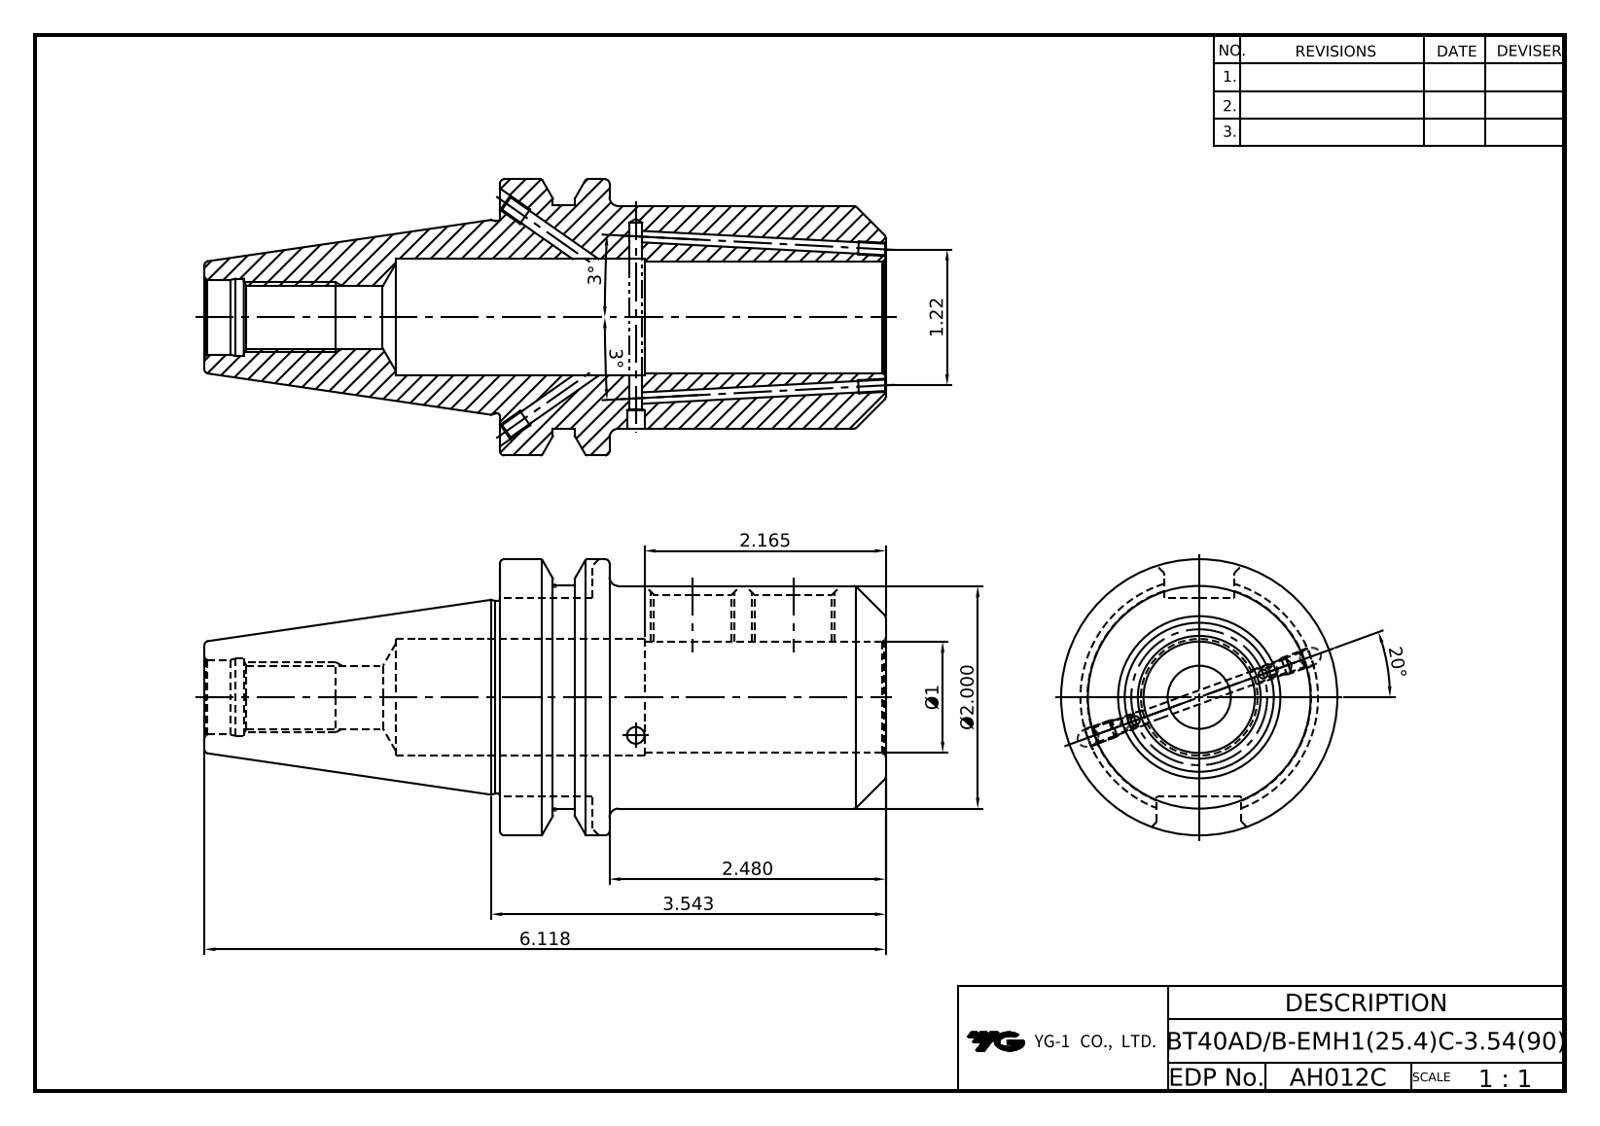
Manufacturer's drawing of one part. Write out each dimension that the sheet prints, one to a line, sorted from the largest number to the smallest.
20°
6.118
3.543
3°
3°
2.480
2.165
Ø2.000
1.22
Ø1
